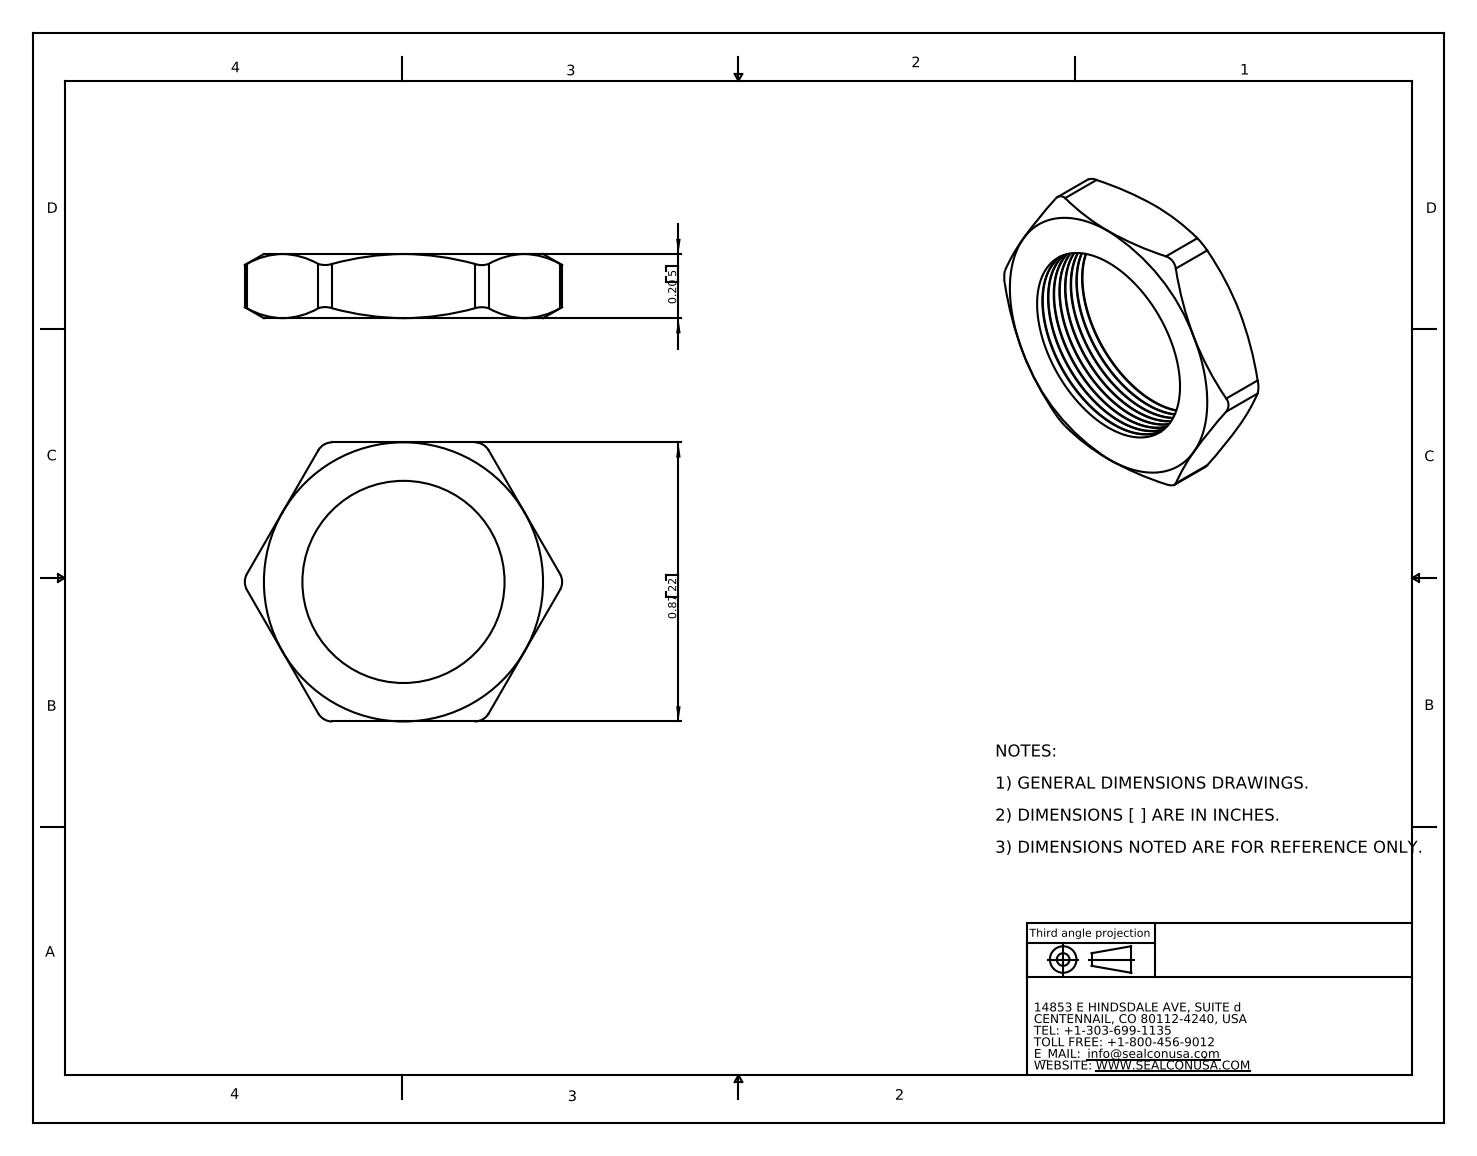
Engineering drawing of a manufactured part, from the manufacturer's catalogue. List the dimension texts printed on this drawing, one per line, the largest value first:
0.87 22
0.20 5
